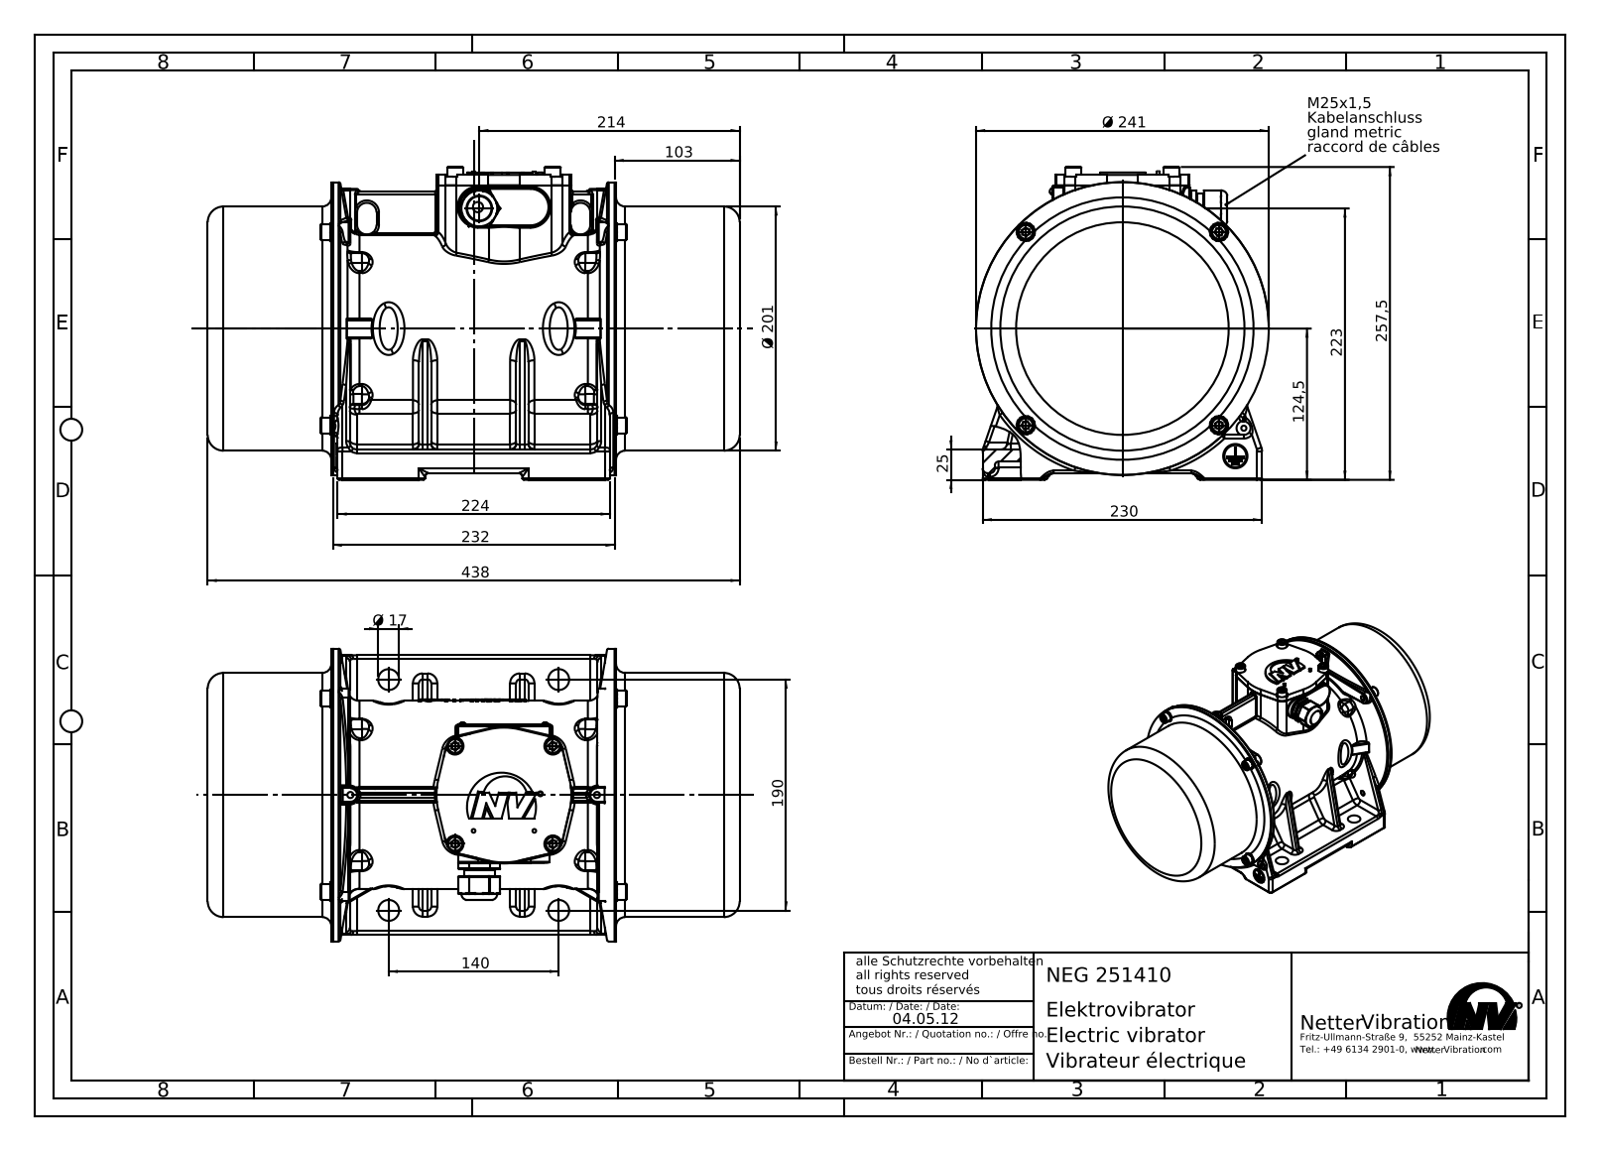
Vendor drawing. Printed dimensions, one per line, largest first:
438
257,5
Ø 241
232
230
224
223
214
Ø 201
190
140
124,5
103
25
Ø 17
